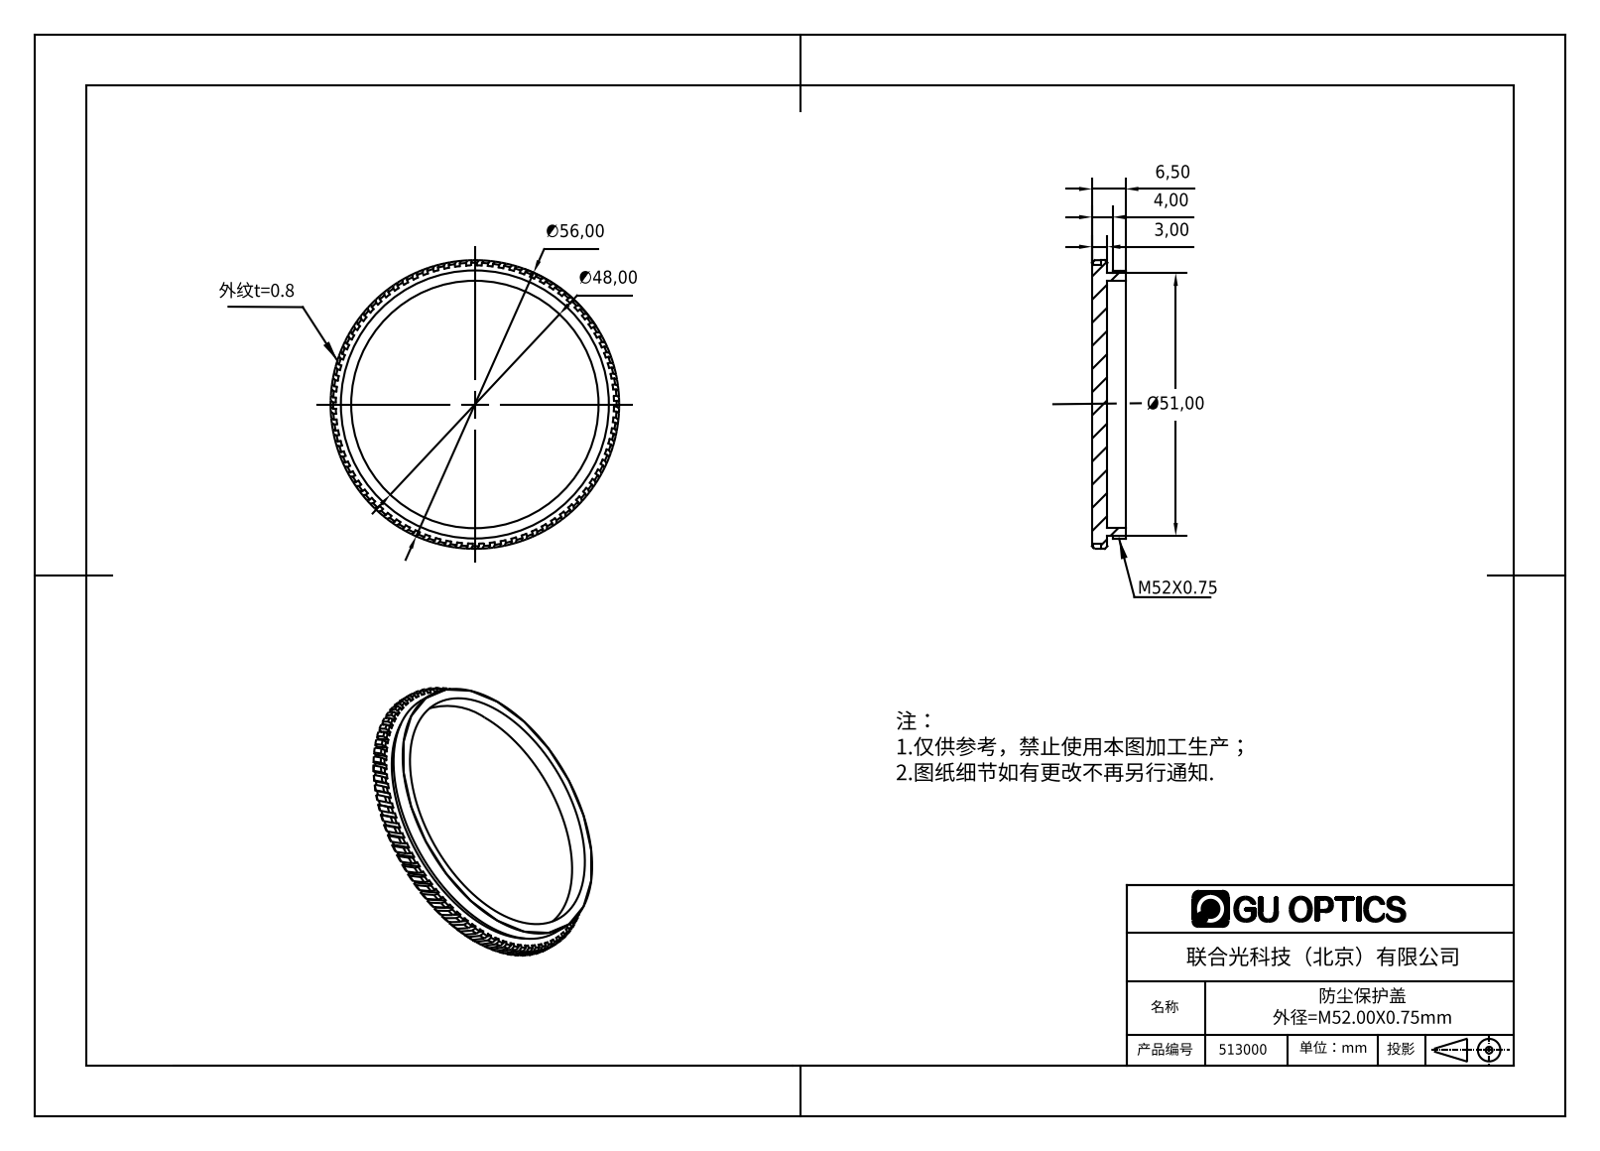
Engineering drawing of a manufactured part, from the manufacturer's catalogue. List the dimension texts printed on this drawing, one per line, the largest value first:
∅56,00
Ø51,00
∅48,00
6,50
4,00
3,00
